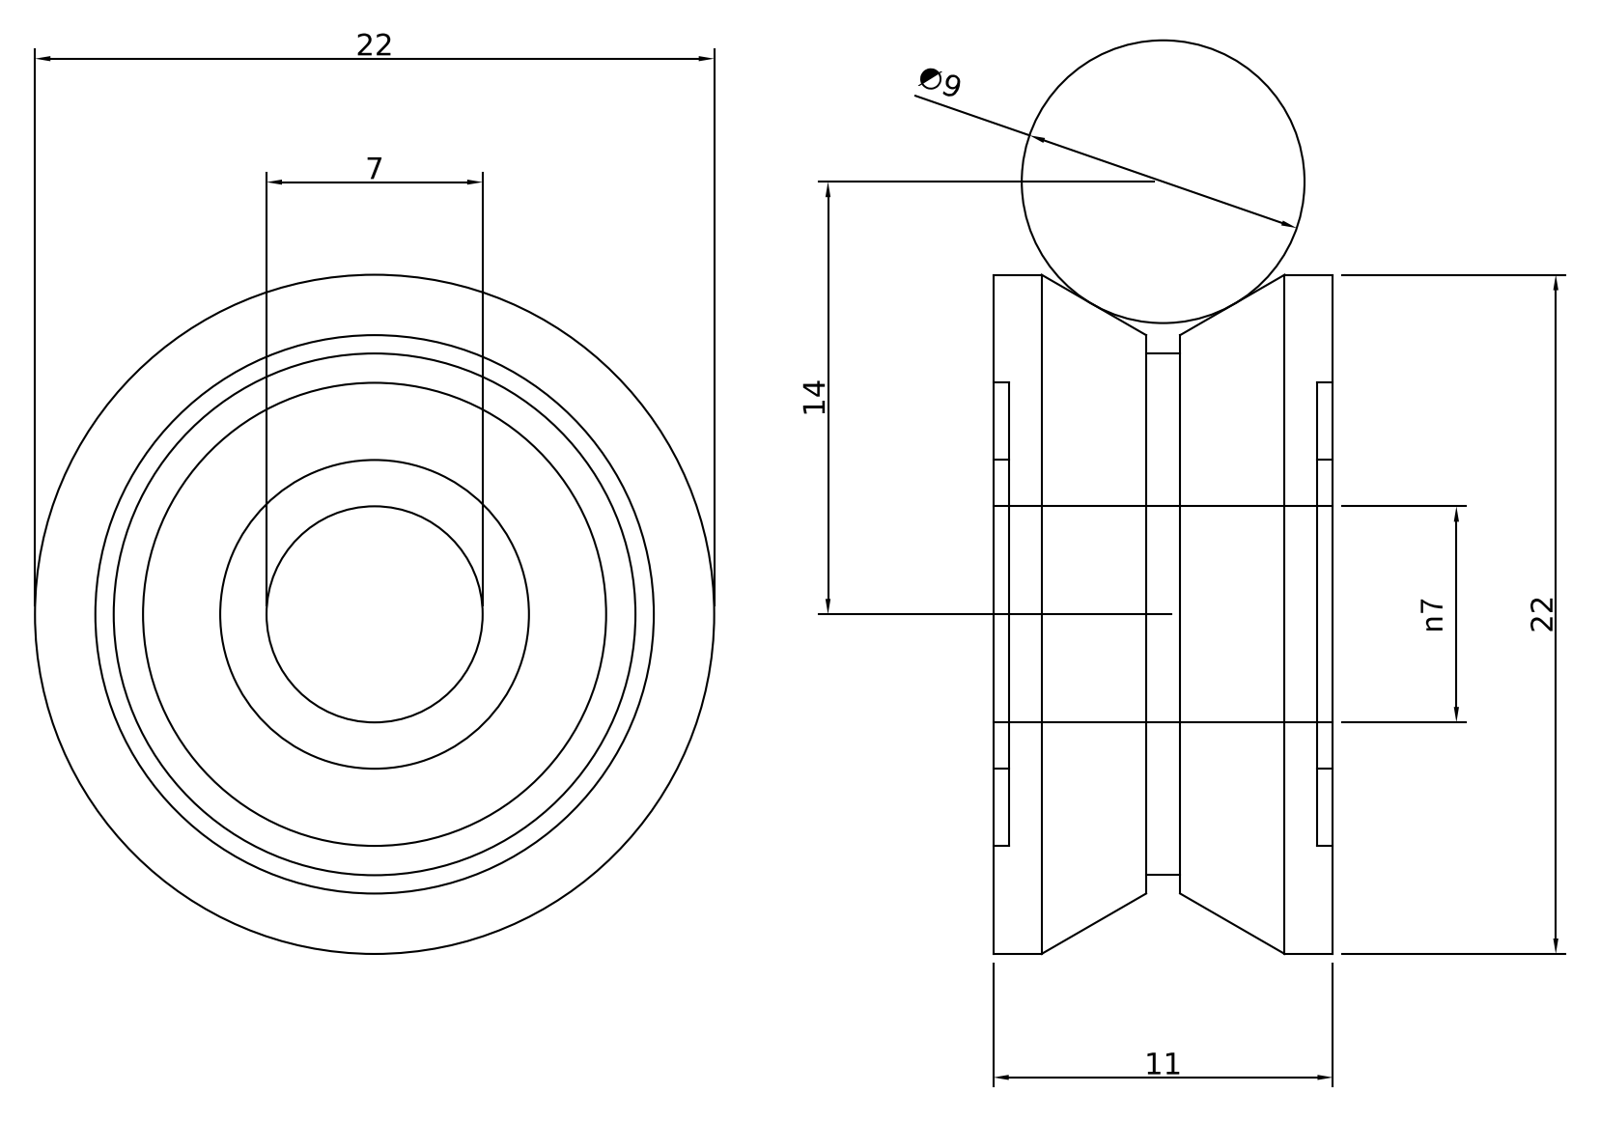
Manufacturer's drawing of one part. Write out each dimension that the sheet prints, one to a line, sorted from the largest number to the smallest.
22
22
14
11
∅9
7
n7
